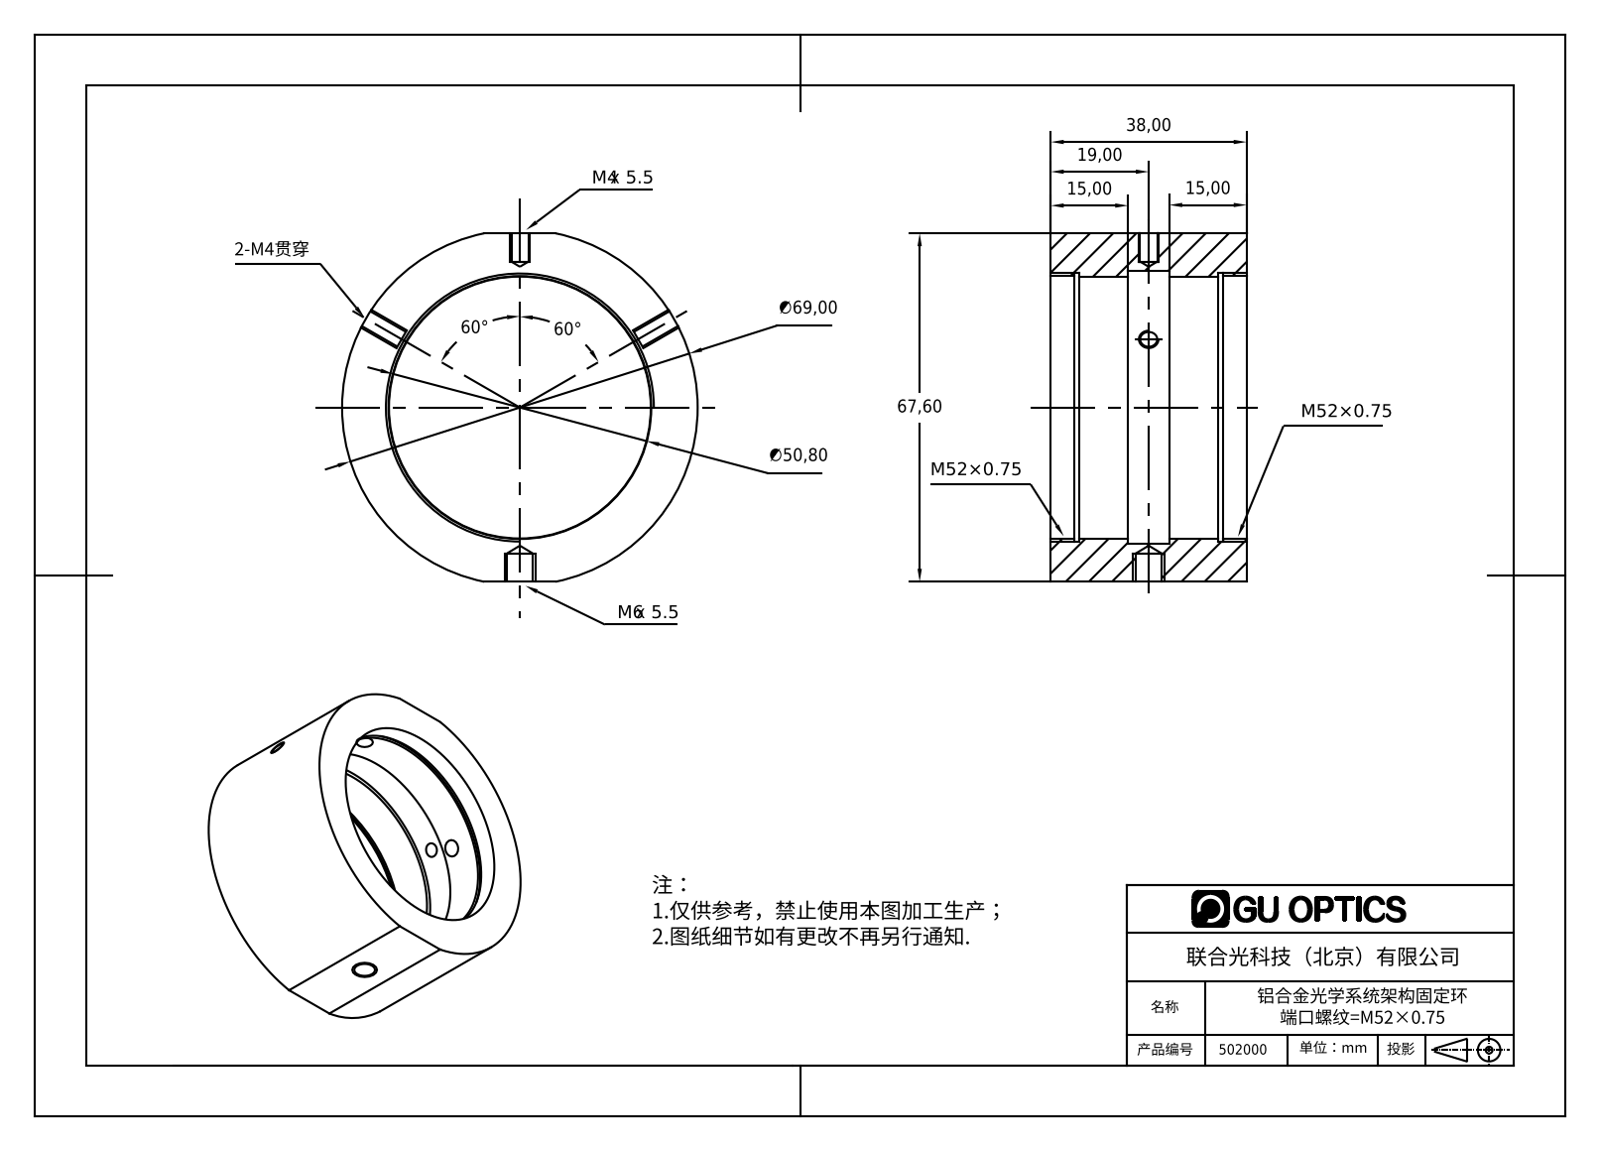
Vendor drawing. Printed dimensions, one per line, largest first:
∅69,00
67,60
60°
60°
∅50,80
38,00
19,00
15,00
15,00
